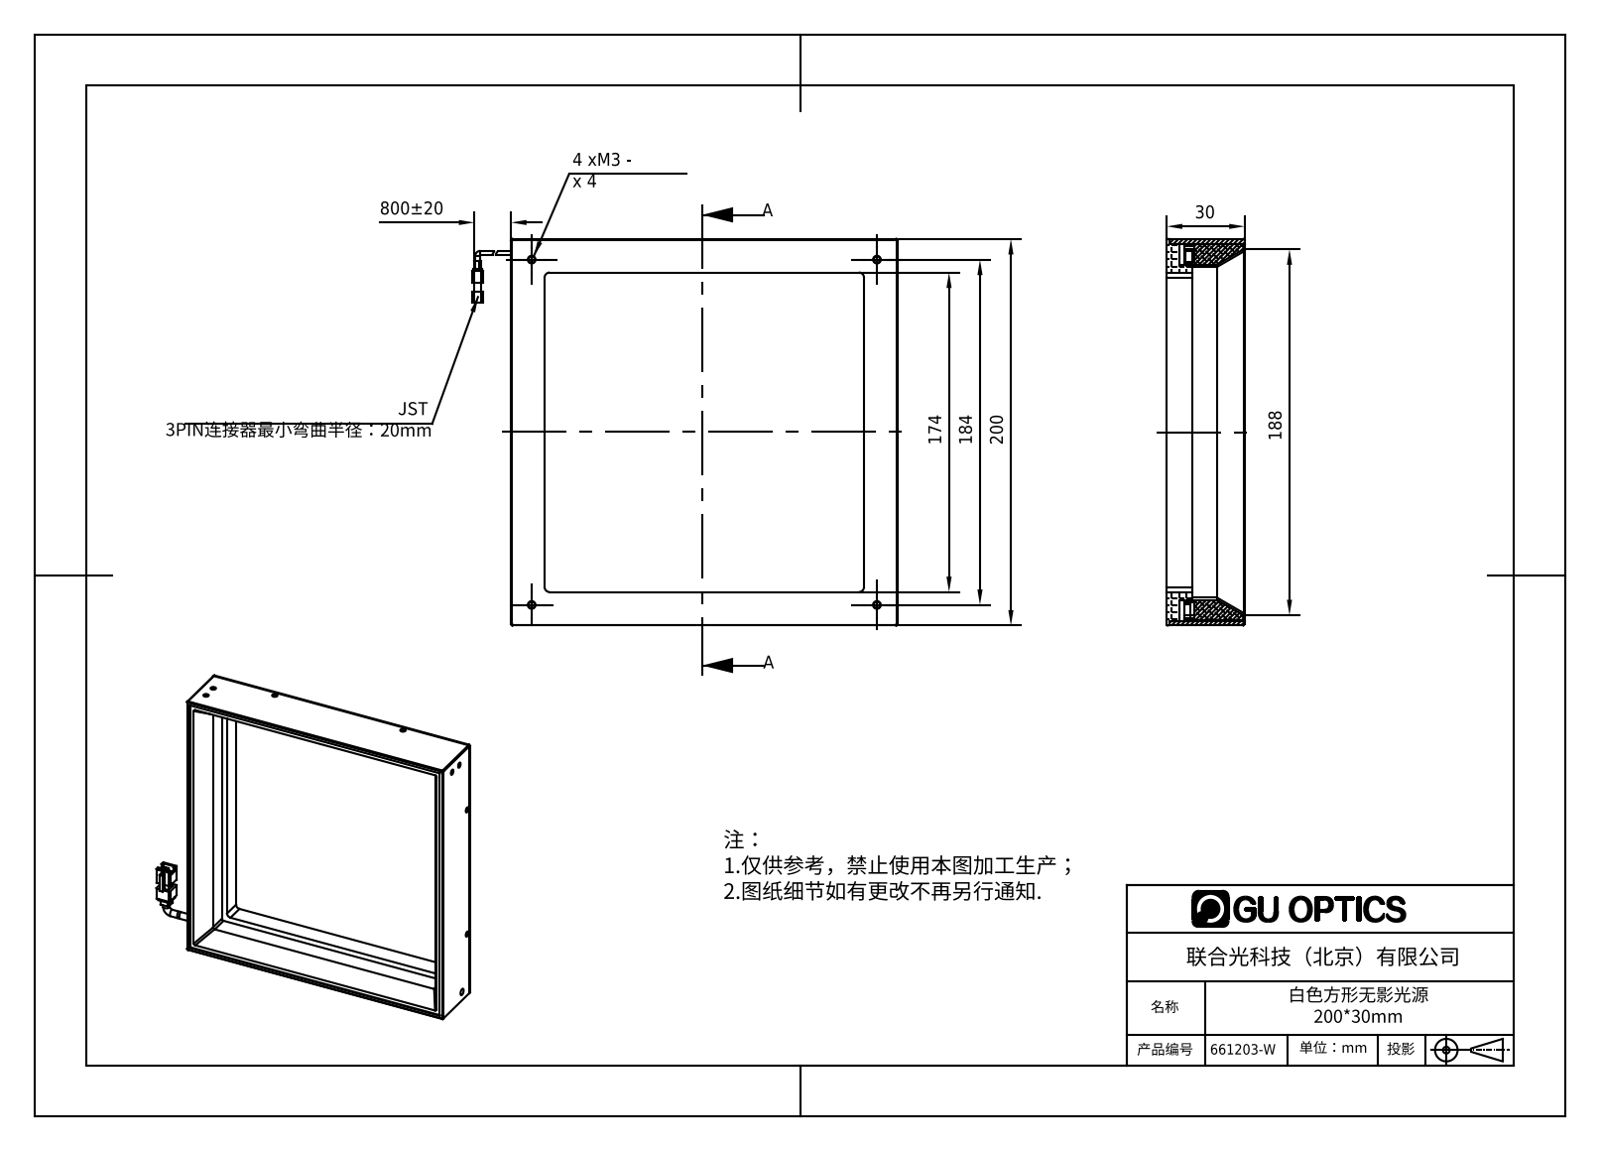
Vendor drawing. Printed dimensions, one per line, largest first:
800±20
200
188
184
174
30
